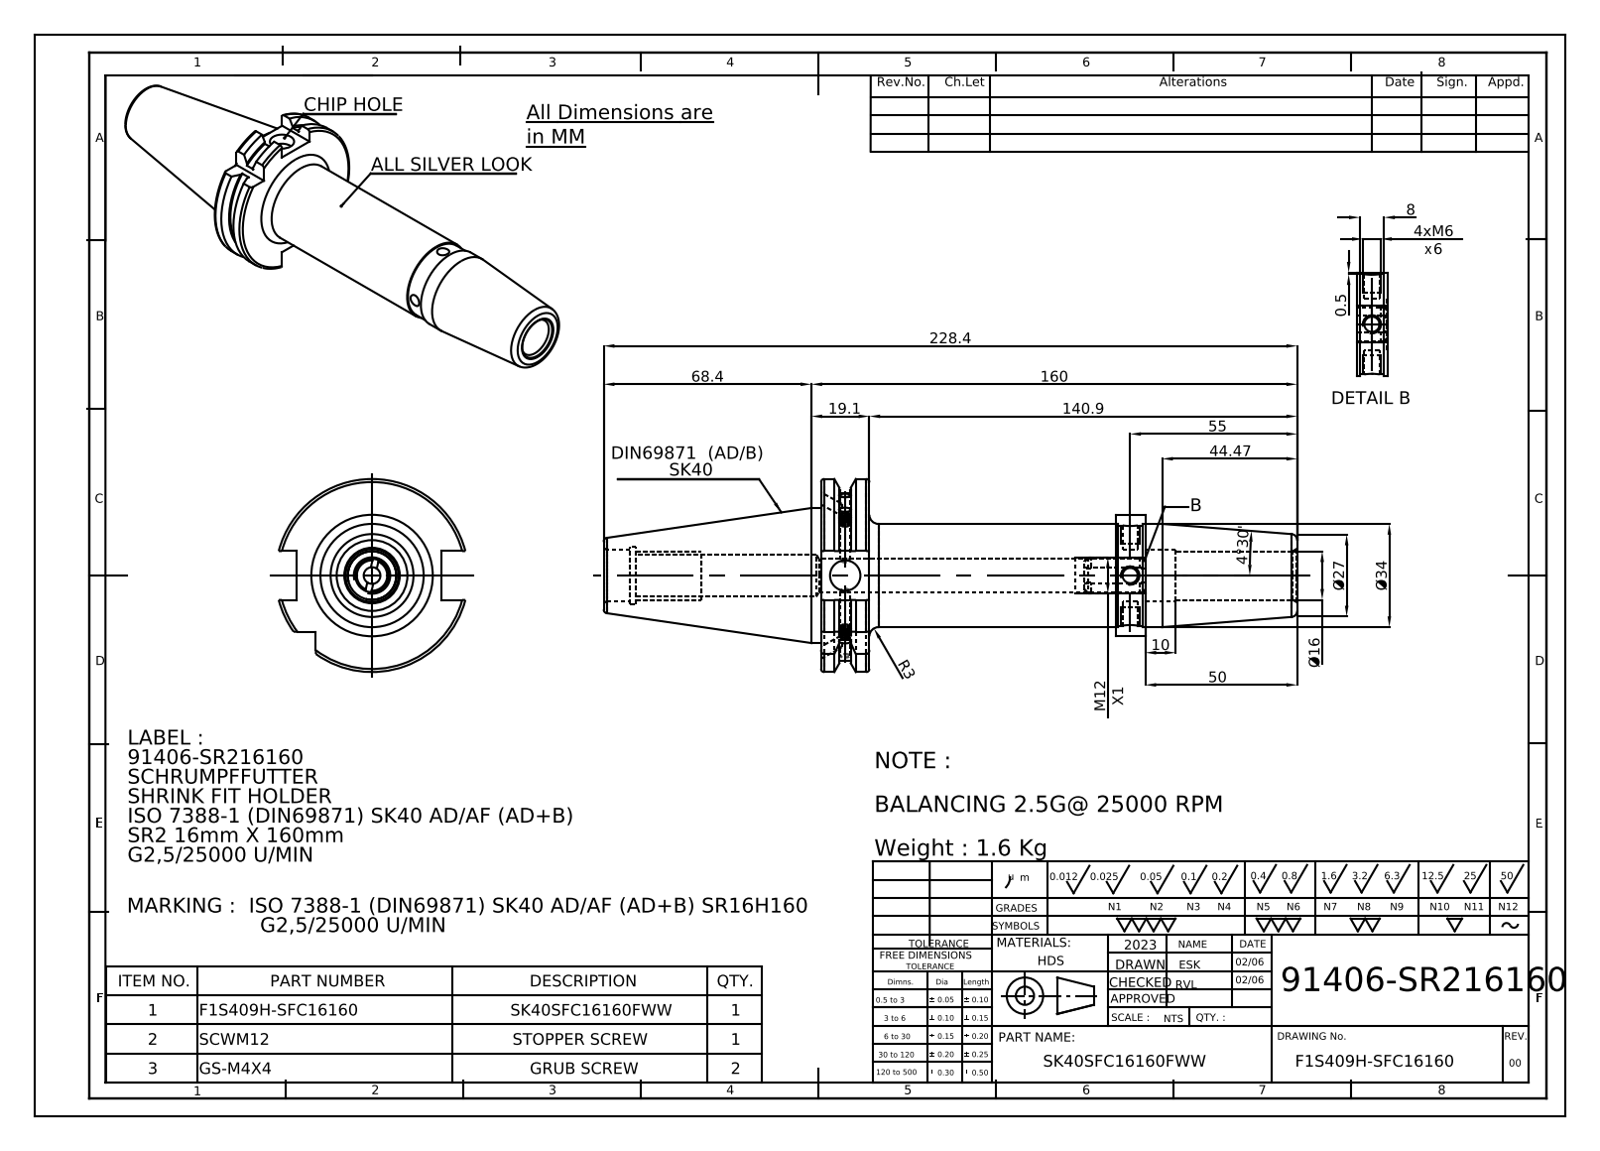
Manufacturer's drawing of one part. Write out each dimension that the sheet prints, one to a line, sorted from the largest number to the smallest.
228.4
160
140.9
68.4
55
50
44.47
Ø34
Ø27
19.1
Ø16
M12 X1
10
8
4xM6 x6
4°30'
R3
0.5
